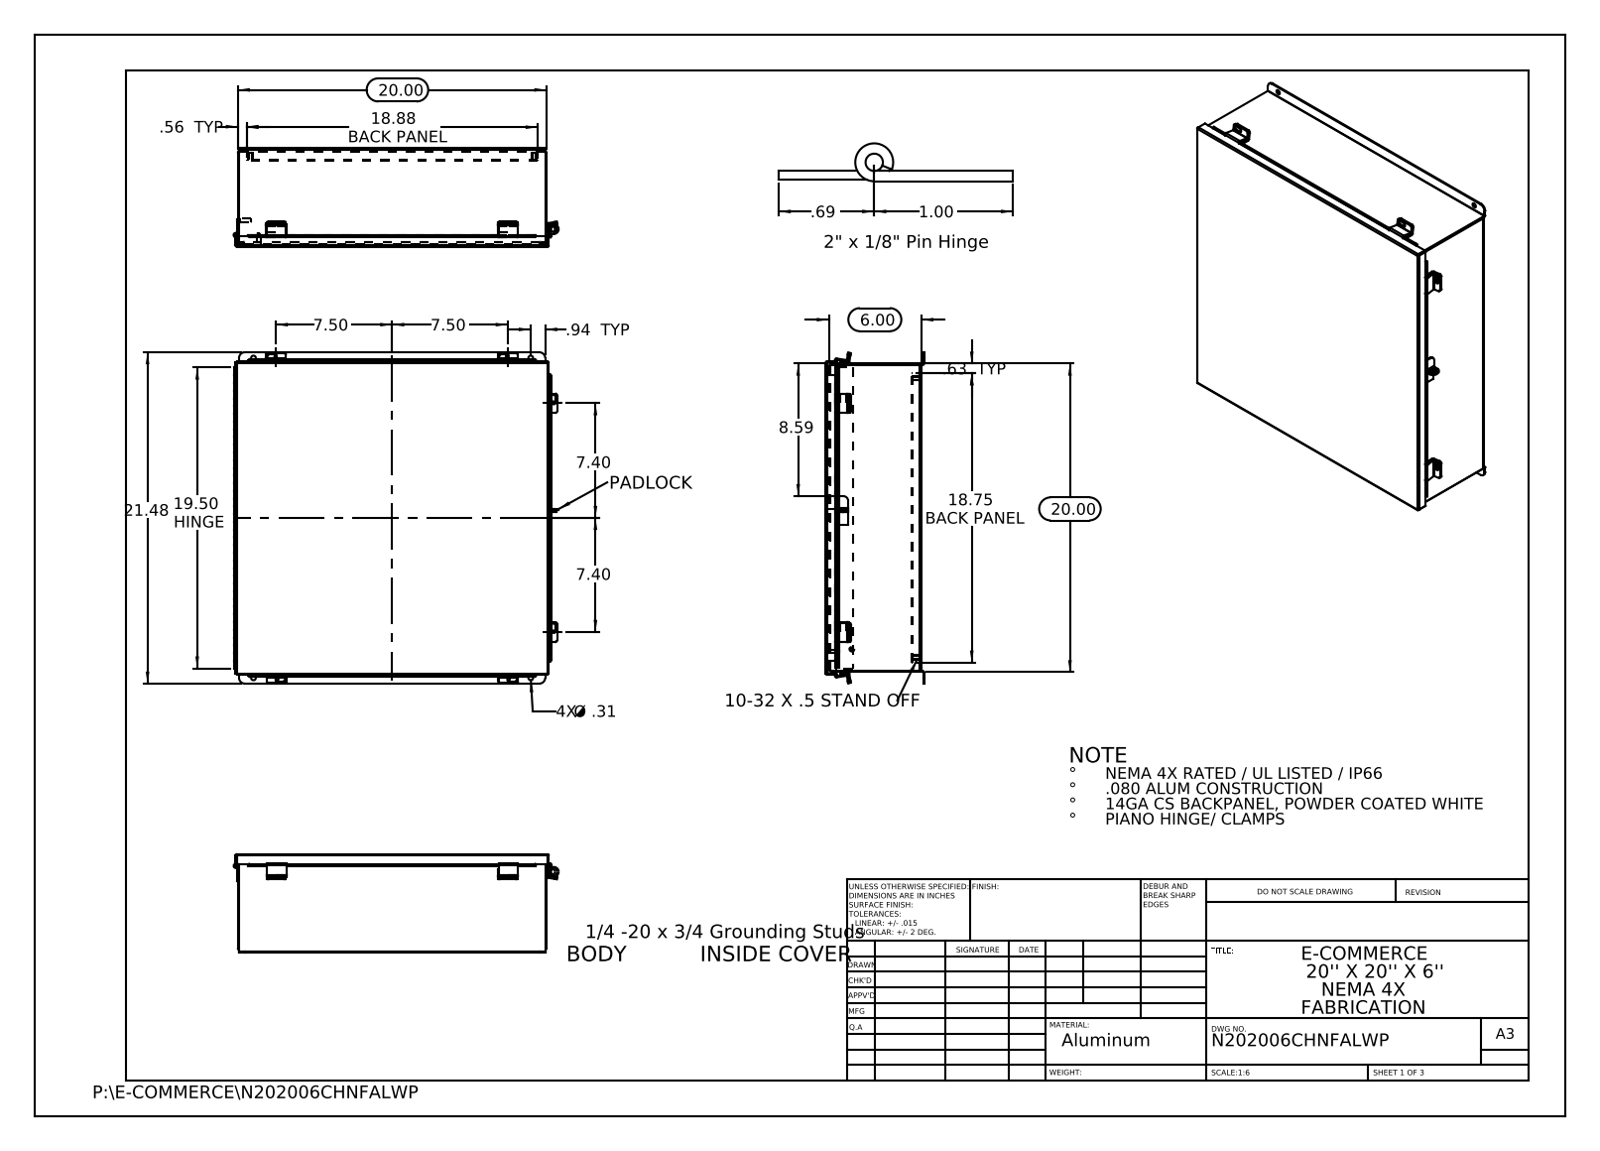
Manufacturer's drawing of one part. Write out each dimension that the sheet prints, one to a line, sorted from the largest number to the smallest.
21.48
20.00
20.00
19.50 HINGE
18.88 BACK PANEL
18.75 BACK PANEL
8.59
7.50
7.50
7.40
7.40
6.00
1.00
.94 TYP
.69
.63 TYP
.56 TYP
4X Ø .31
